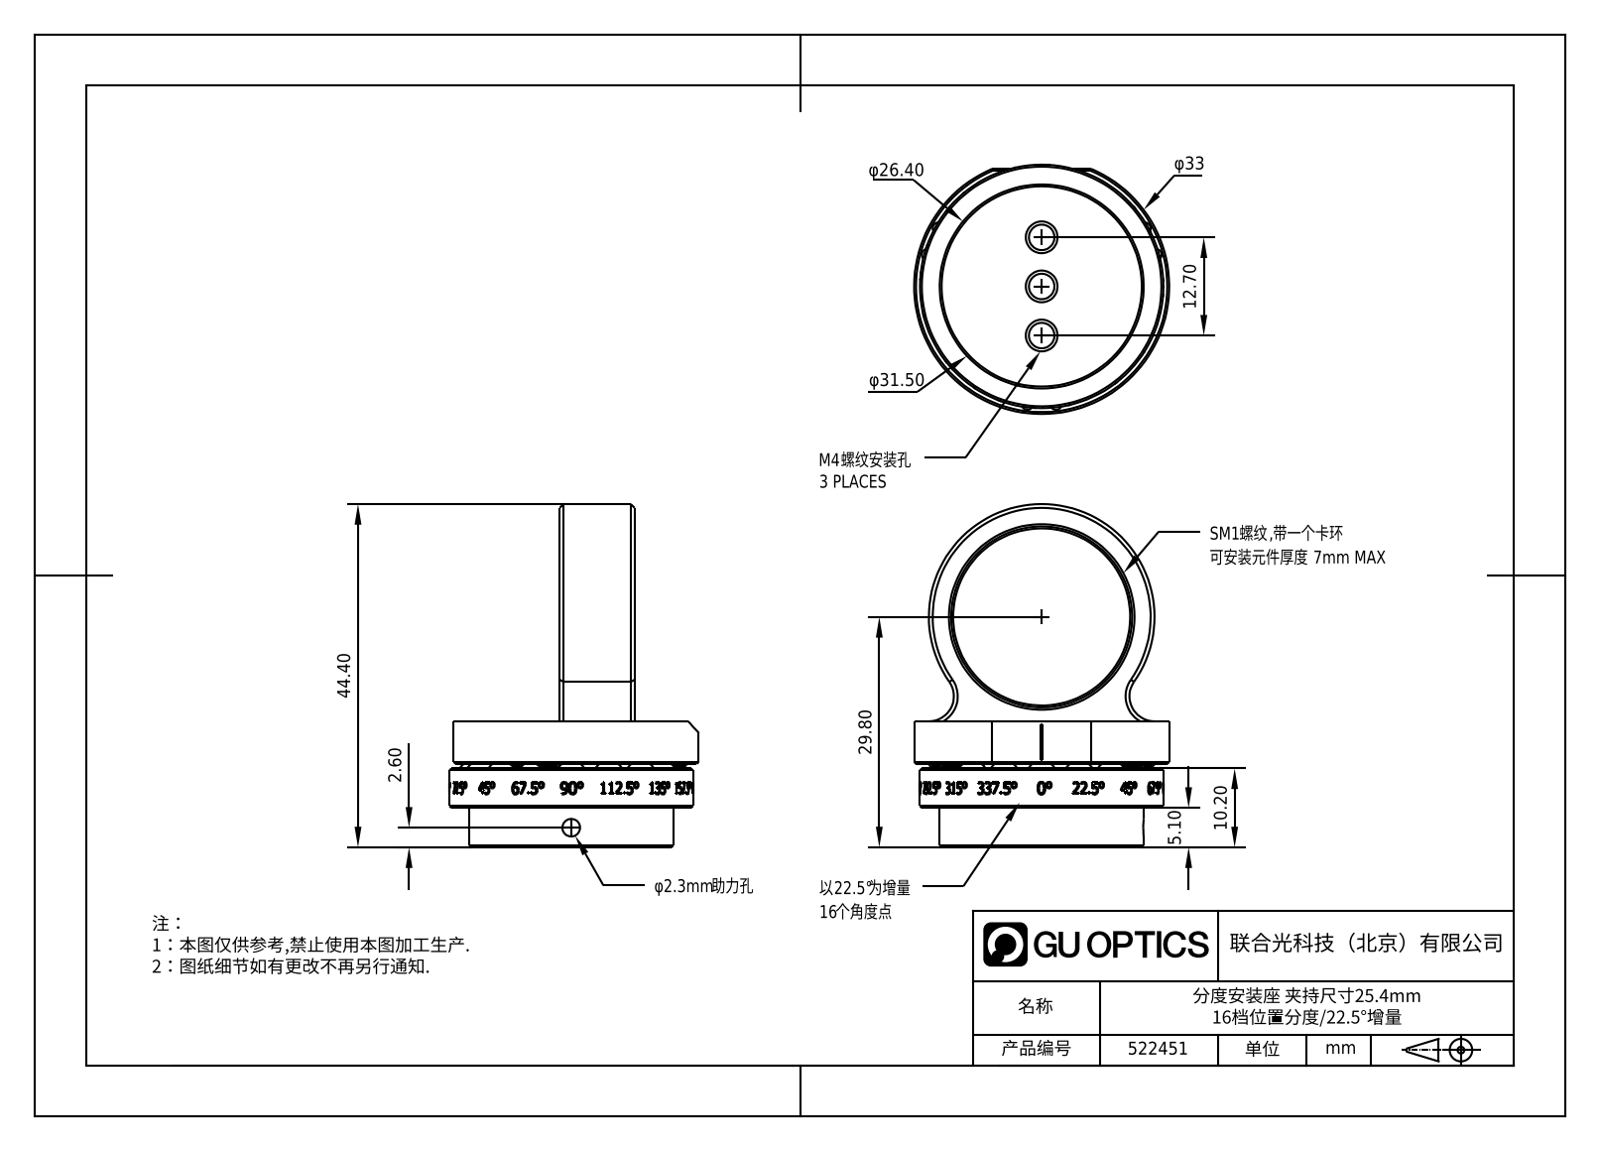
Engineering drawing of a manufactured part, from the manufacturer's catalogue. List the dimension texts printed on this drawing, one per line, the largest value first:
44.40
29.80
12.70
10.20
5.10
2.60
